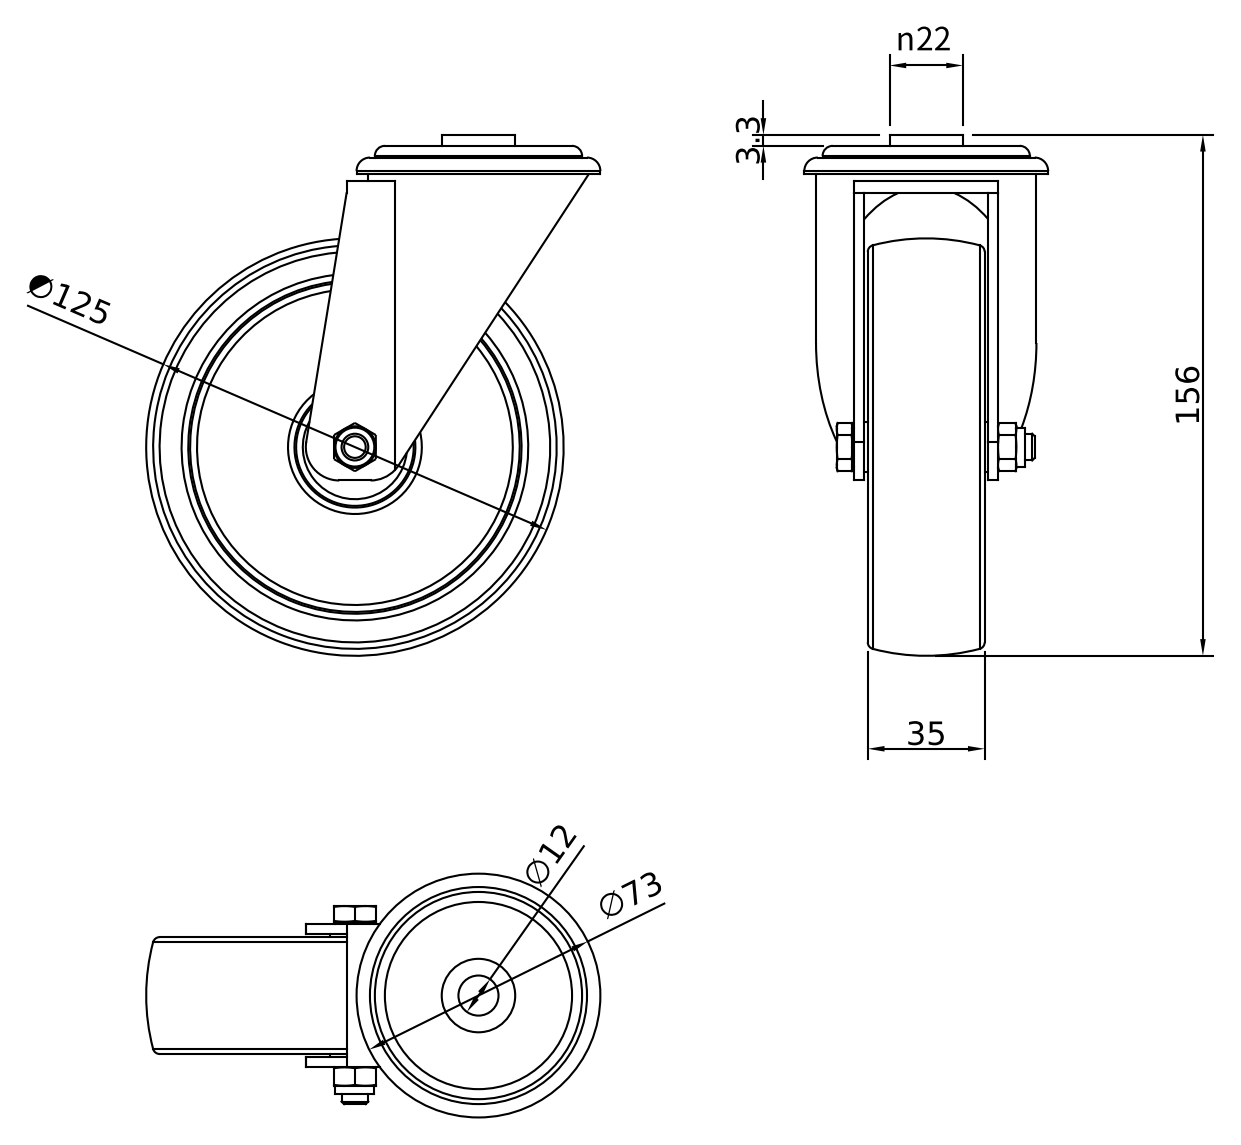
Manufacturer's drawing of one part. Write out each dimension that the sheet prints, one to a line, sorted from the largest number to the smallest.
156
∅125
∅73
35
n22
∅12
3.3
